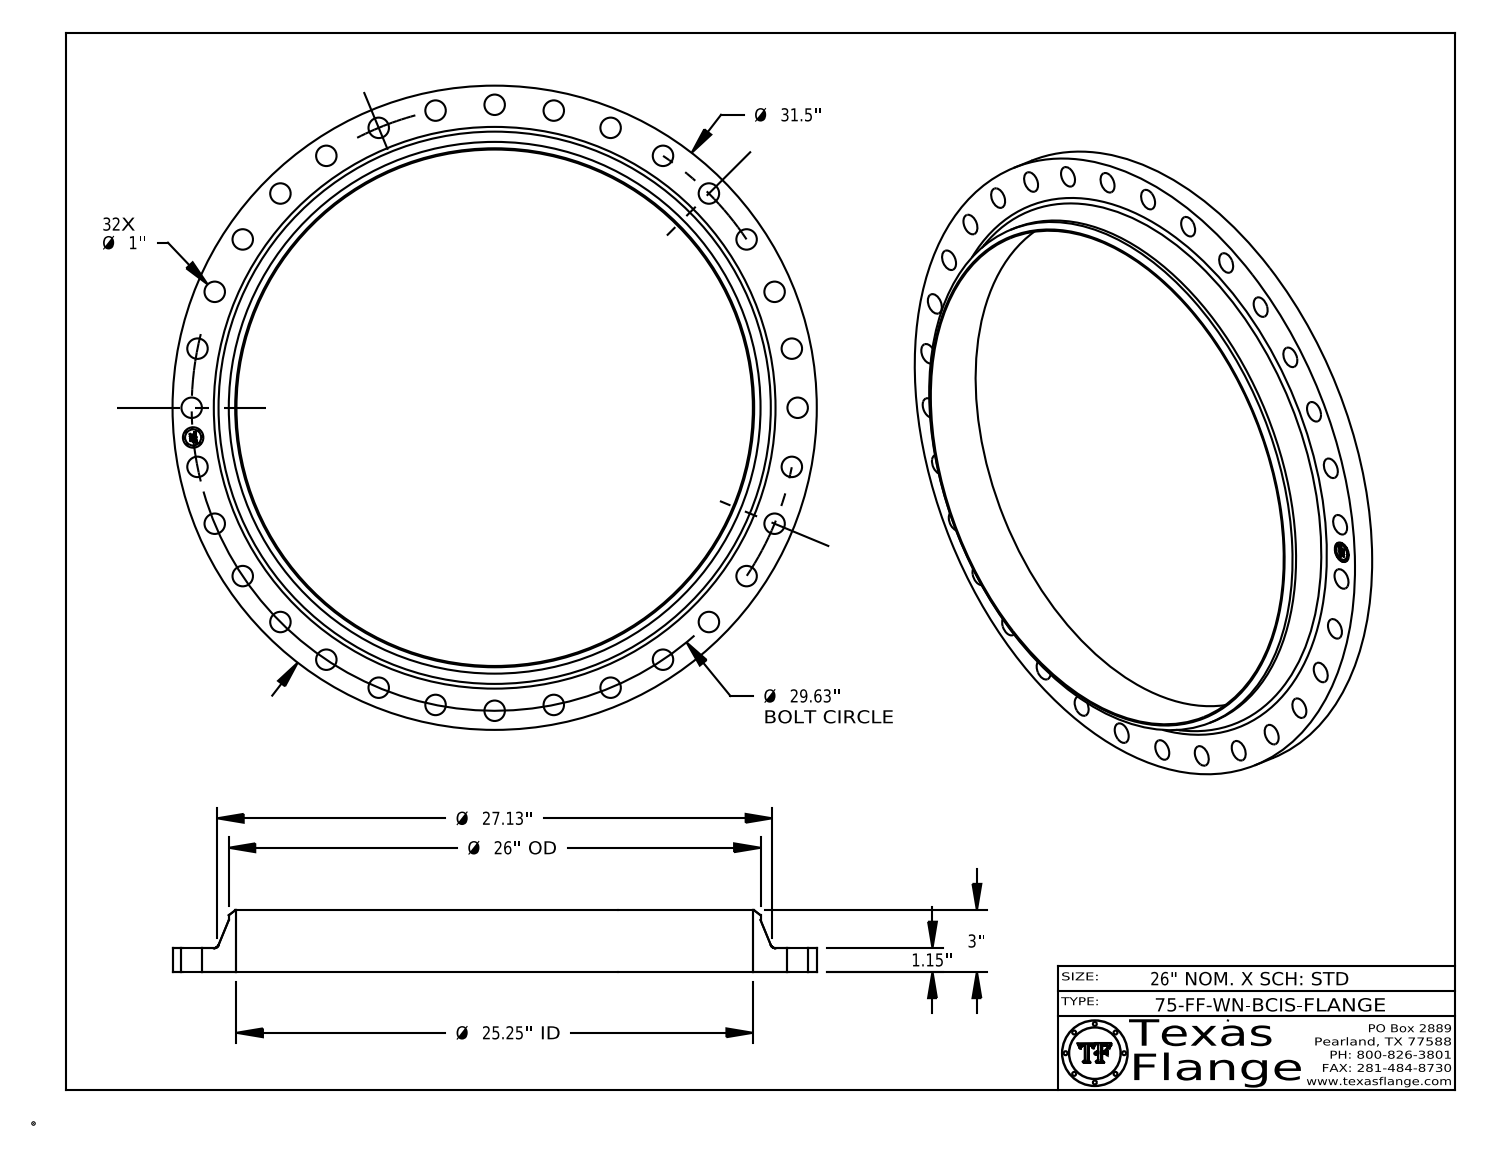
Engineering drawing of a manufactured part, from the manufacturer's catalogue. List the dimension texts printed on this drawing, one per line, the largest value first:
31.5 " Ø
29.63 " Ø BOLT CIRCLE
27.13 " Ø
26 " Ø OD
25.25 " Ø ID
3 "
1.15 "
1 " Ø
